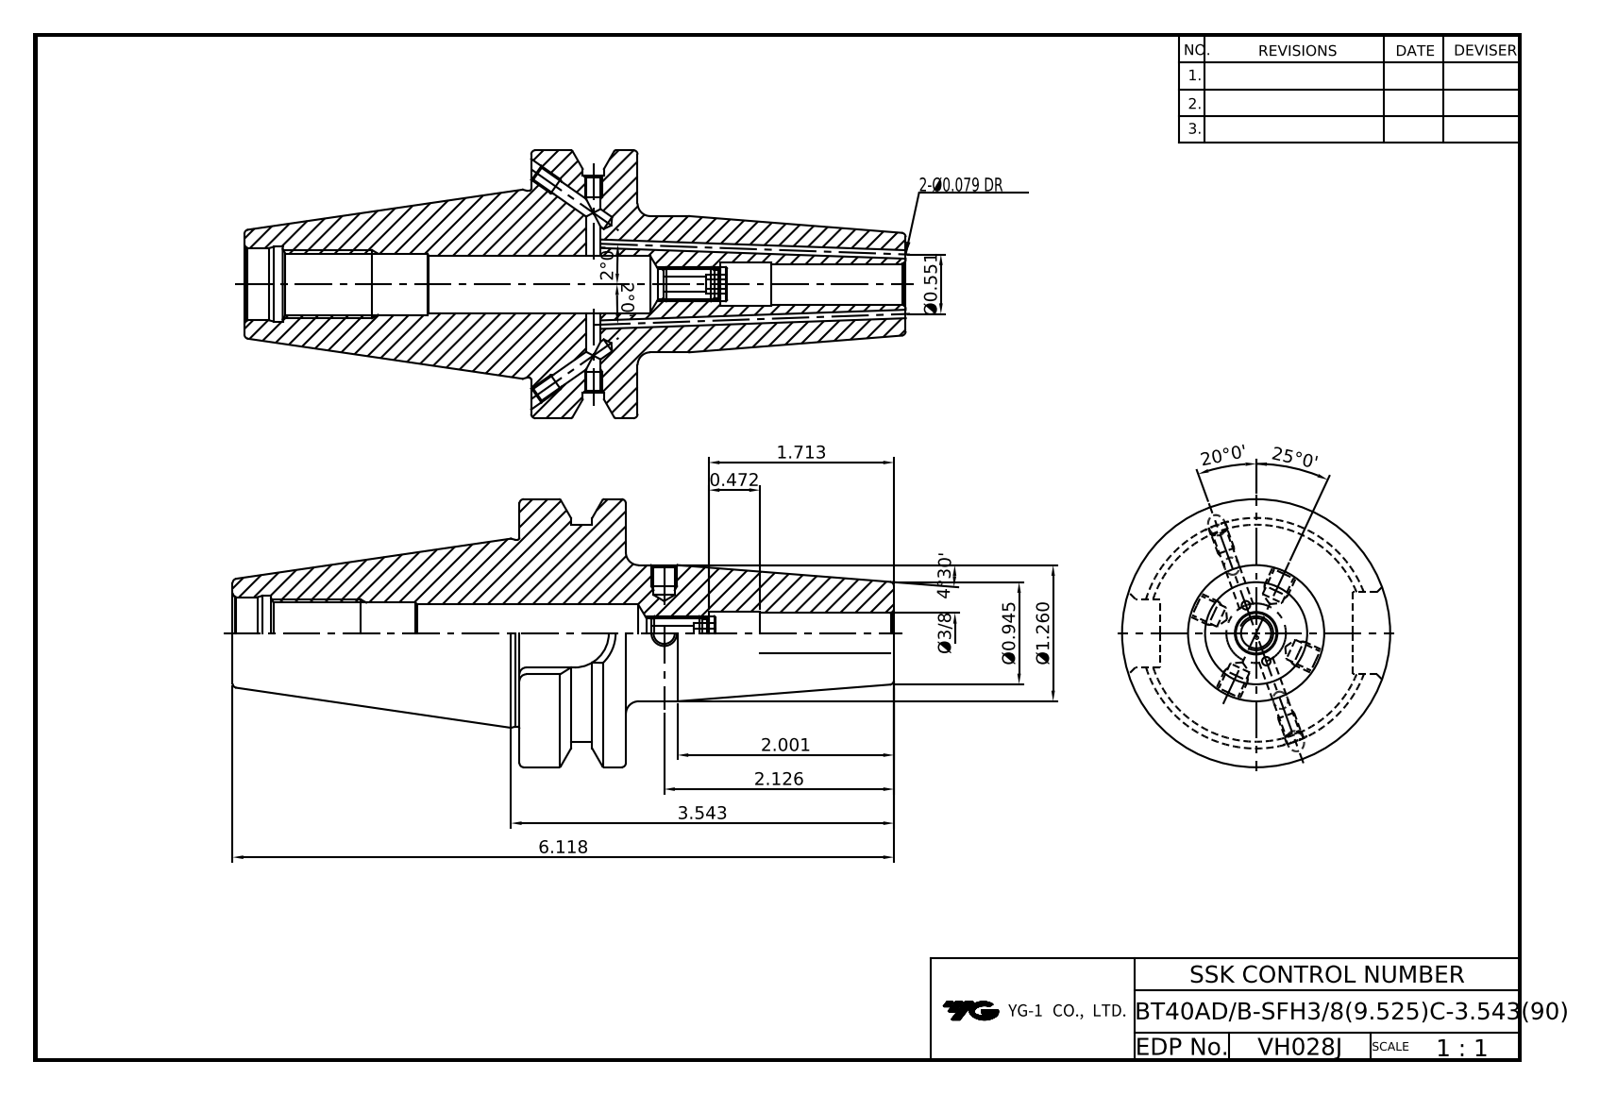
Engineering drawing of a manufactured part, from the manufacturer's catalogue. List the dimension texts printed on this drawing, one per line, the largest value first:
25°0'
6.118
4°30'
3.543
2.126
2.001
2°0'
2°0'
1.713
Ø1.260
Ø0.945
Ø0.551
0.472
